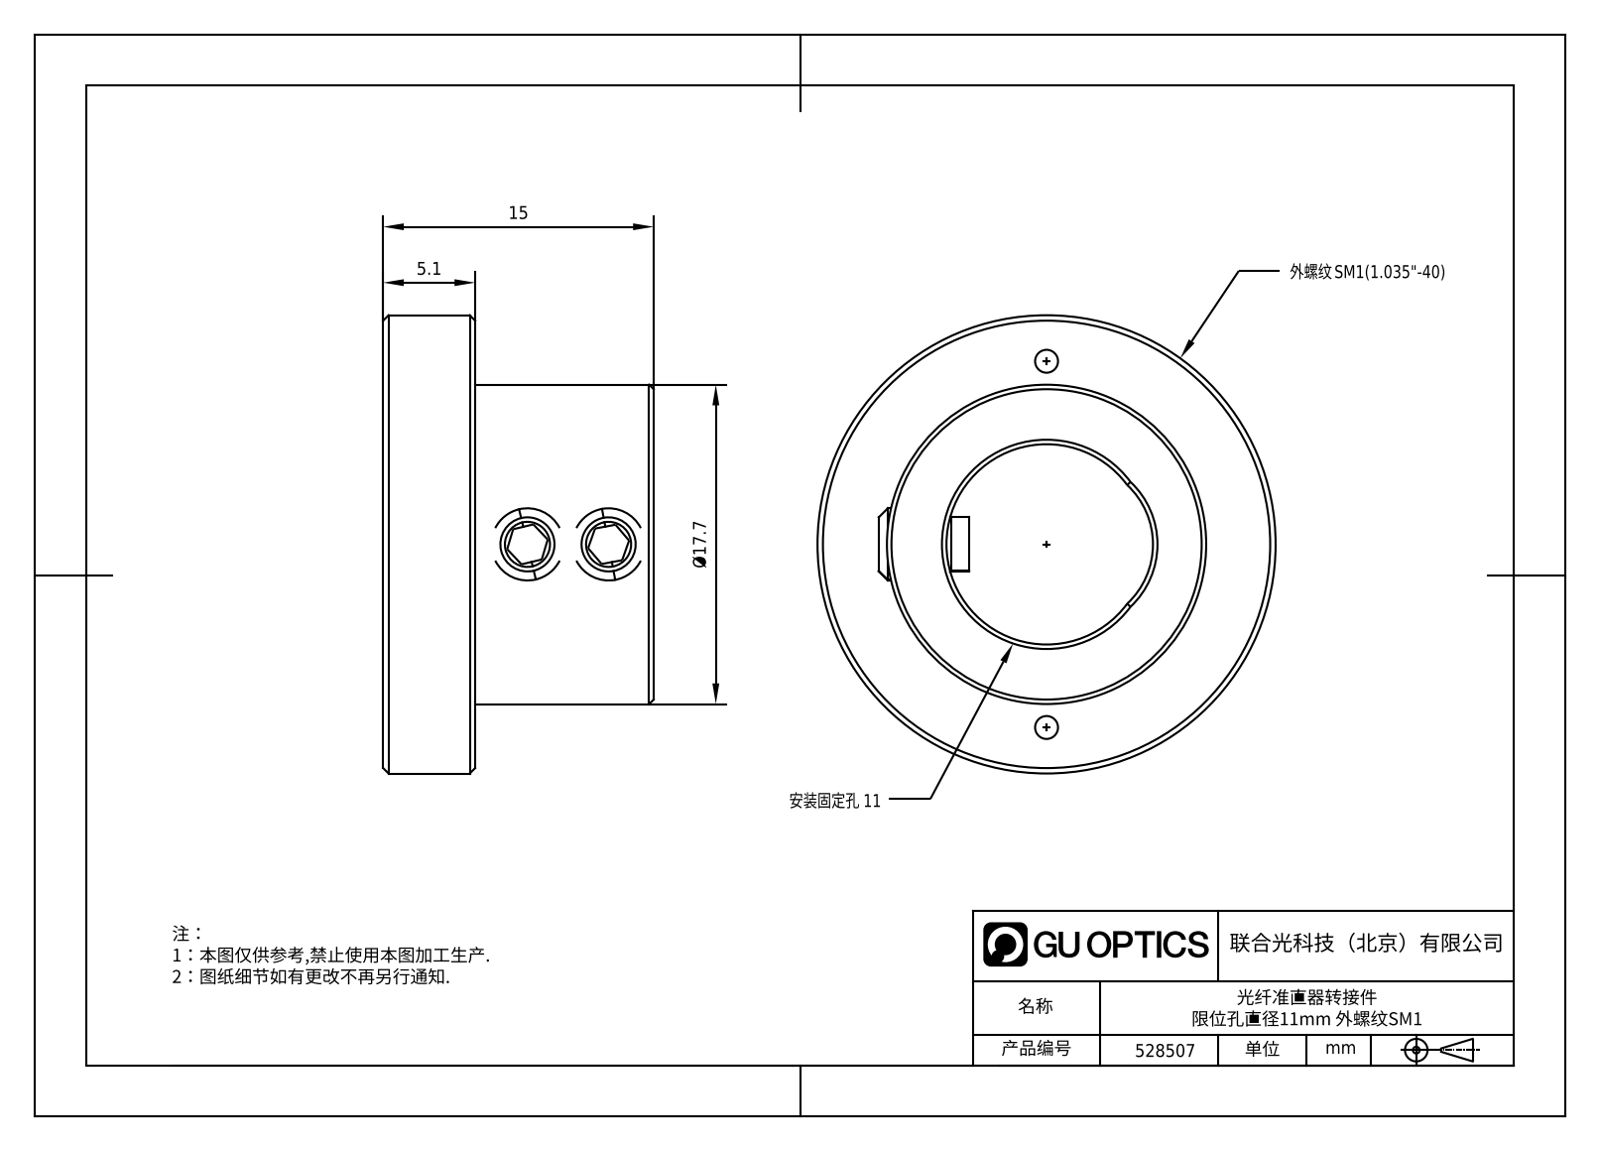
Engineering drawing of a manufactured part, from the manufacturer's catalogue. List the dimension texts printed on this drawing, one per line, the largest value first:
Ø17.7
15
5.1
